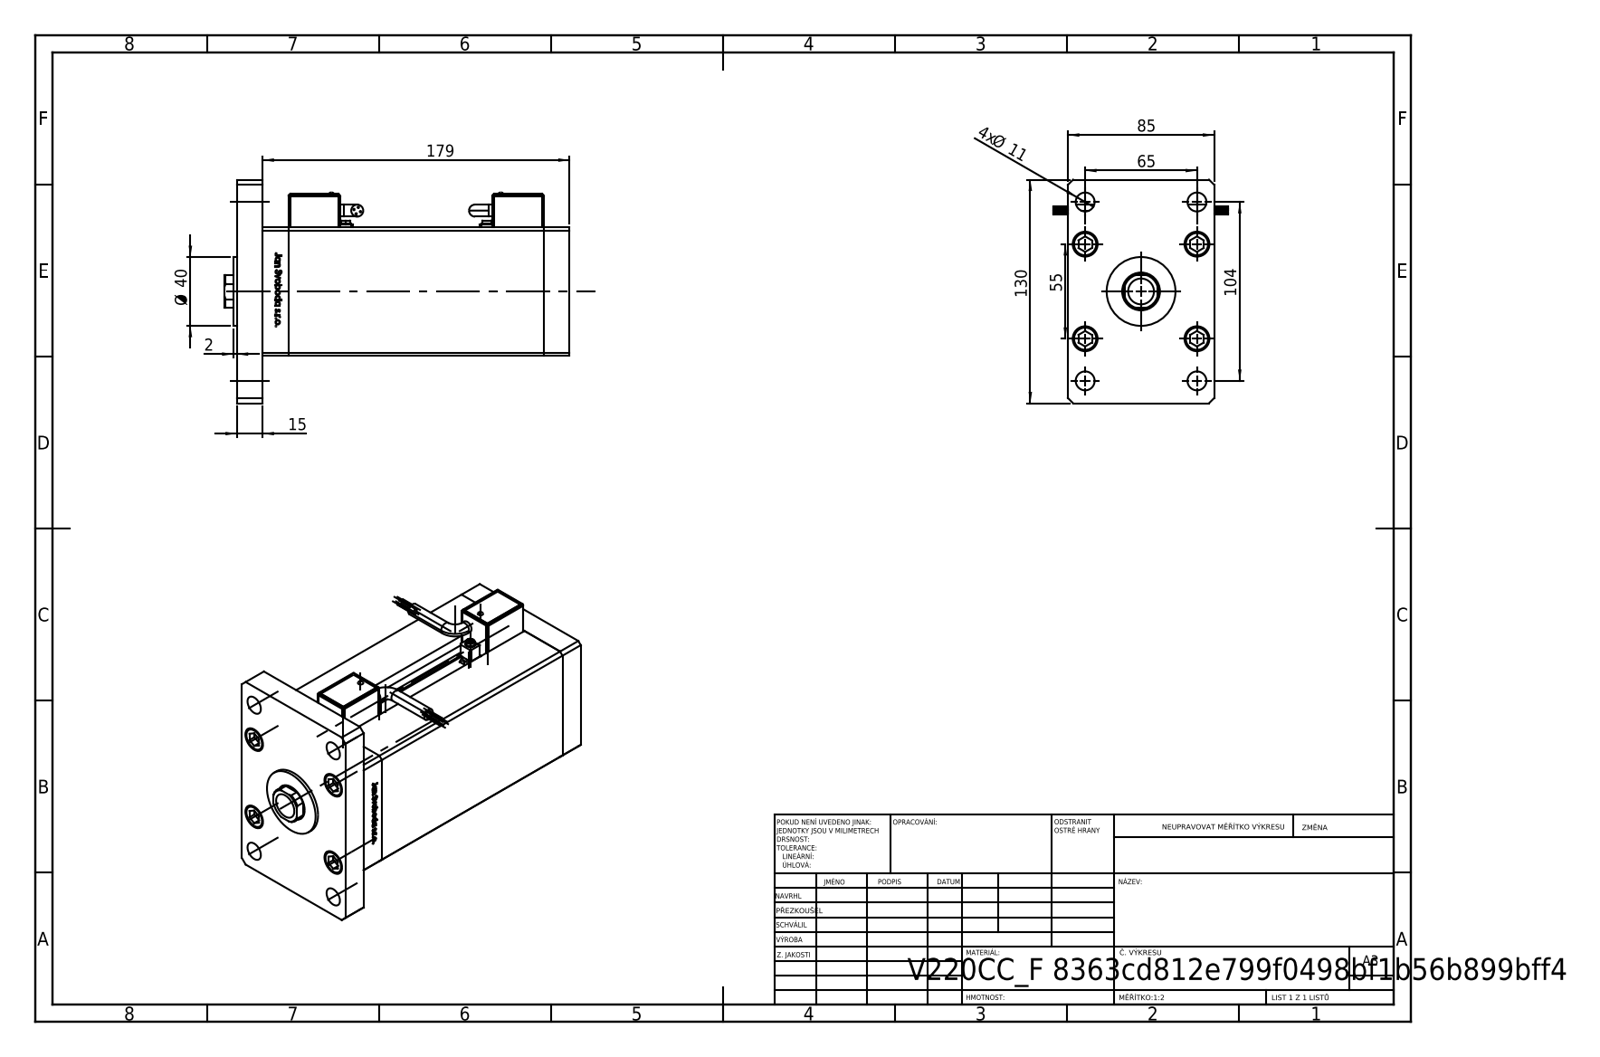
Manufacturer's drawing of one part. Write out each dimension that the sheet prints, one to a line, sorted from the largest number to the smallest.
179
130
104
85
65
55
Ø 40
15
4x Ø 11
2
